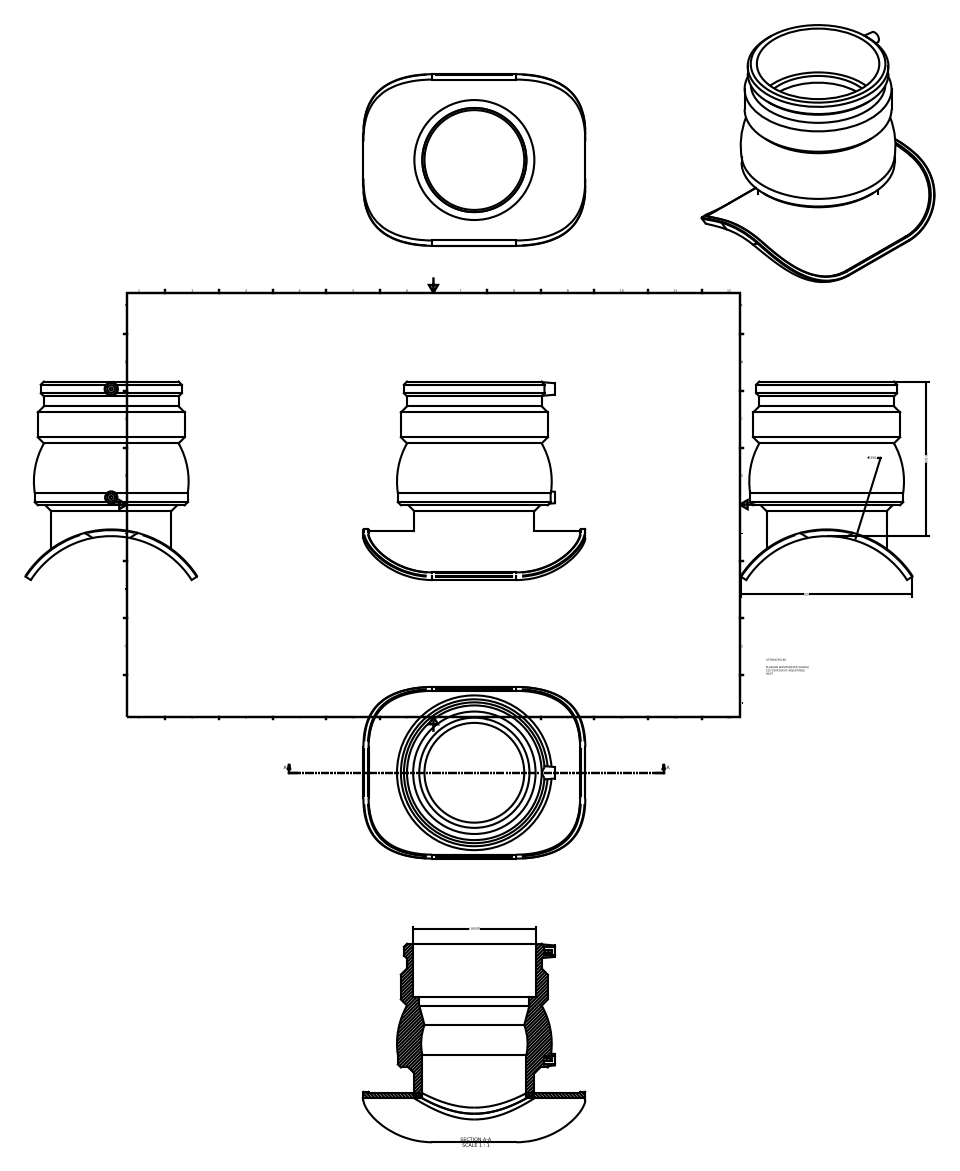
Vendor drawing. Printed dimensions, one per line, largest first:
∅250.0
224
202.00
n160.00
